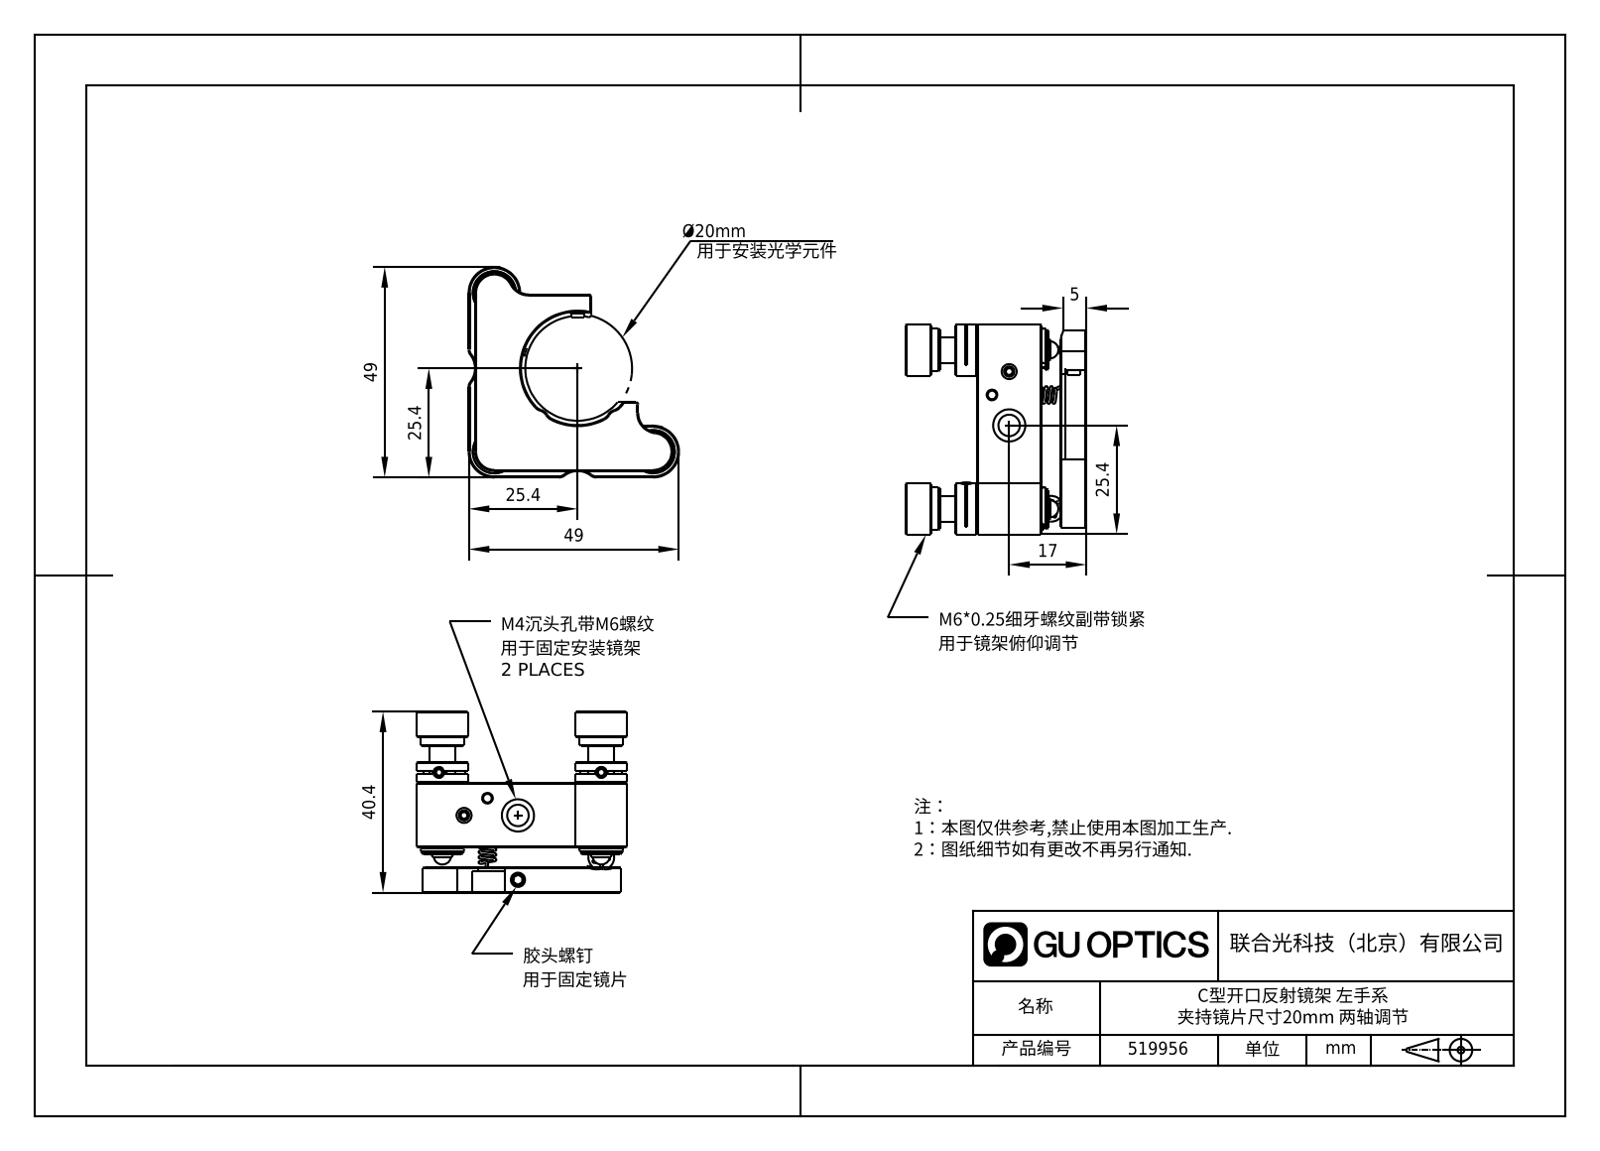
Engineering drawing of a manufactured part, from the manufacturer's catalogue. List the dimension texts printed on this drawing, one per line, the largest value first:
49
49
40.4
25.4
25.4
25.4
17
5
